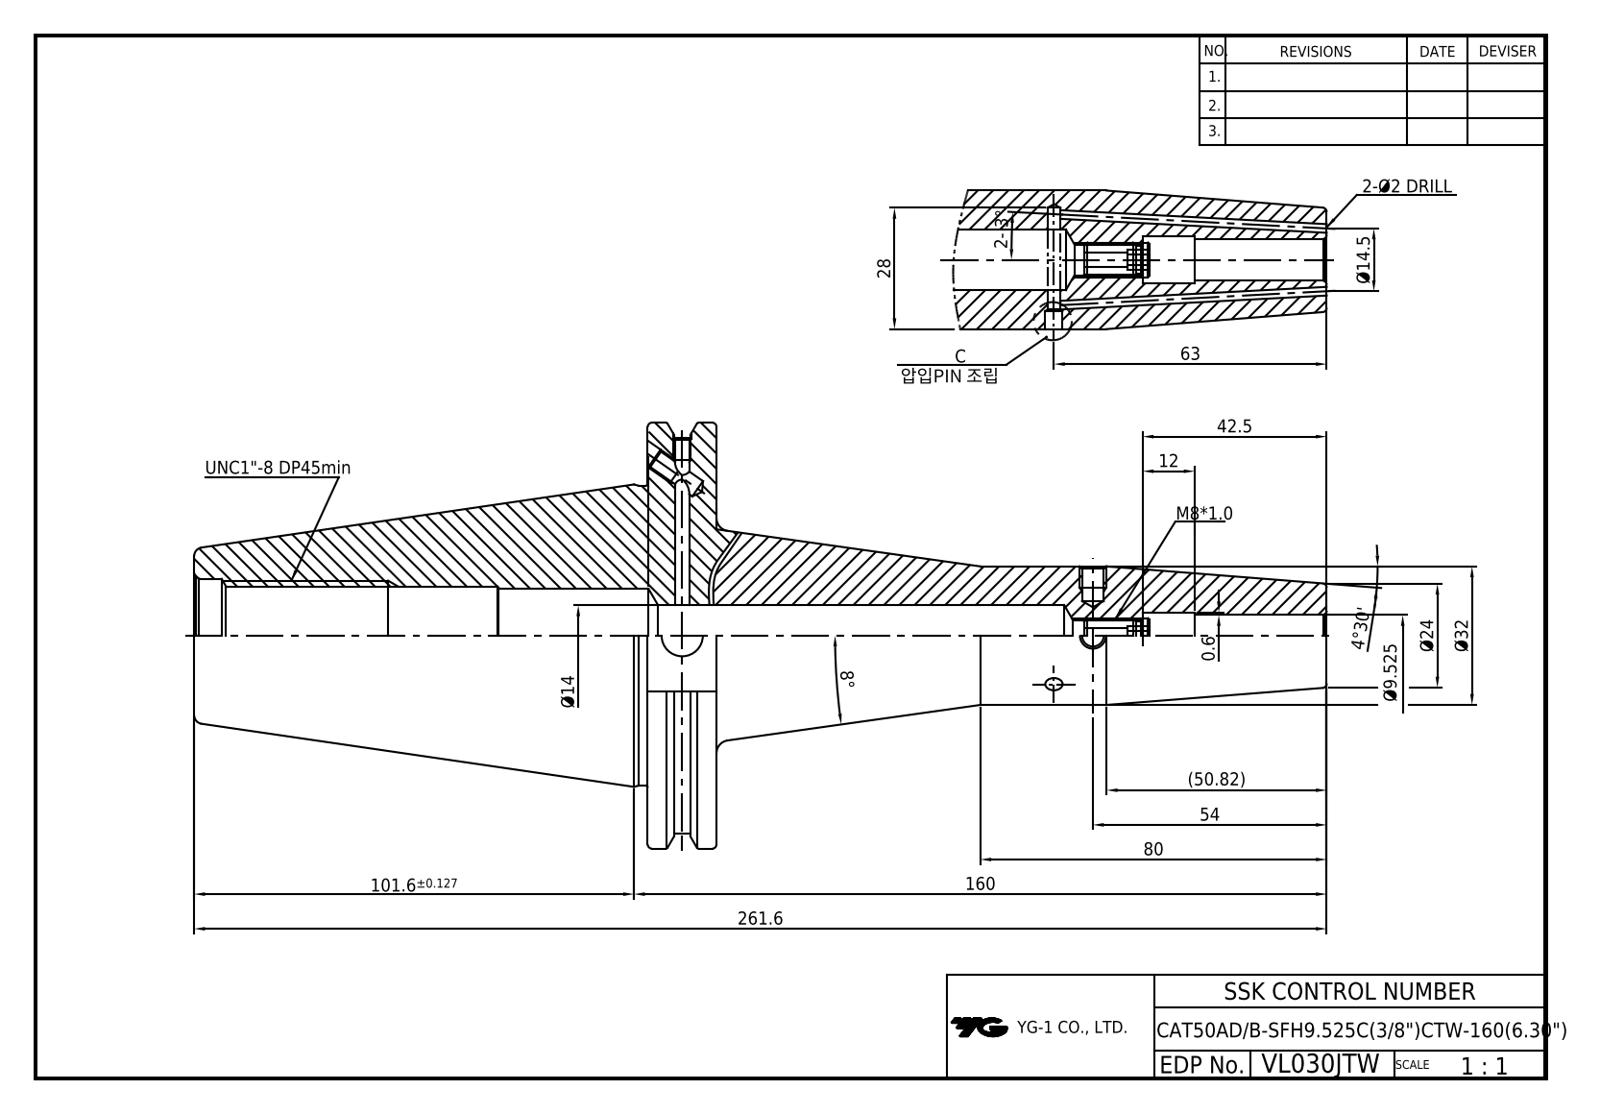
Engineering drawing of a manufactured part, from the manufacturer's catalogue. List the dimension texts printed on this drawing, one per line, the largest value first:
261.6
160
101.6±0.127
80
63
54
(50.82)
42.5
Ø32
28
Ø24
Ø14.5
Ø14
12
8°
4°30'
2- 3°
0.6
